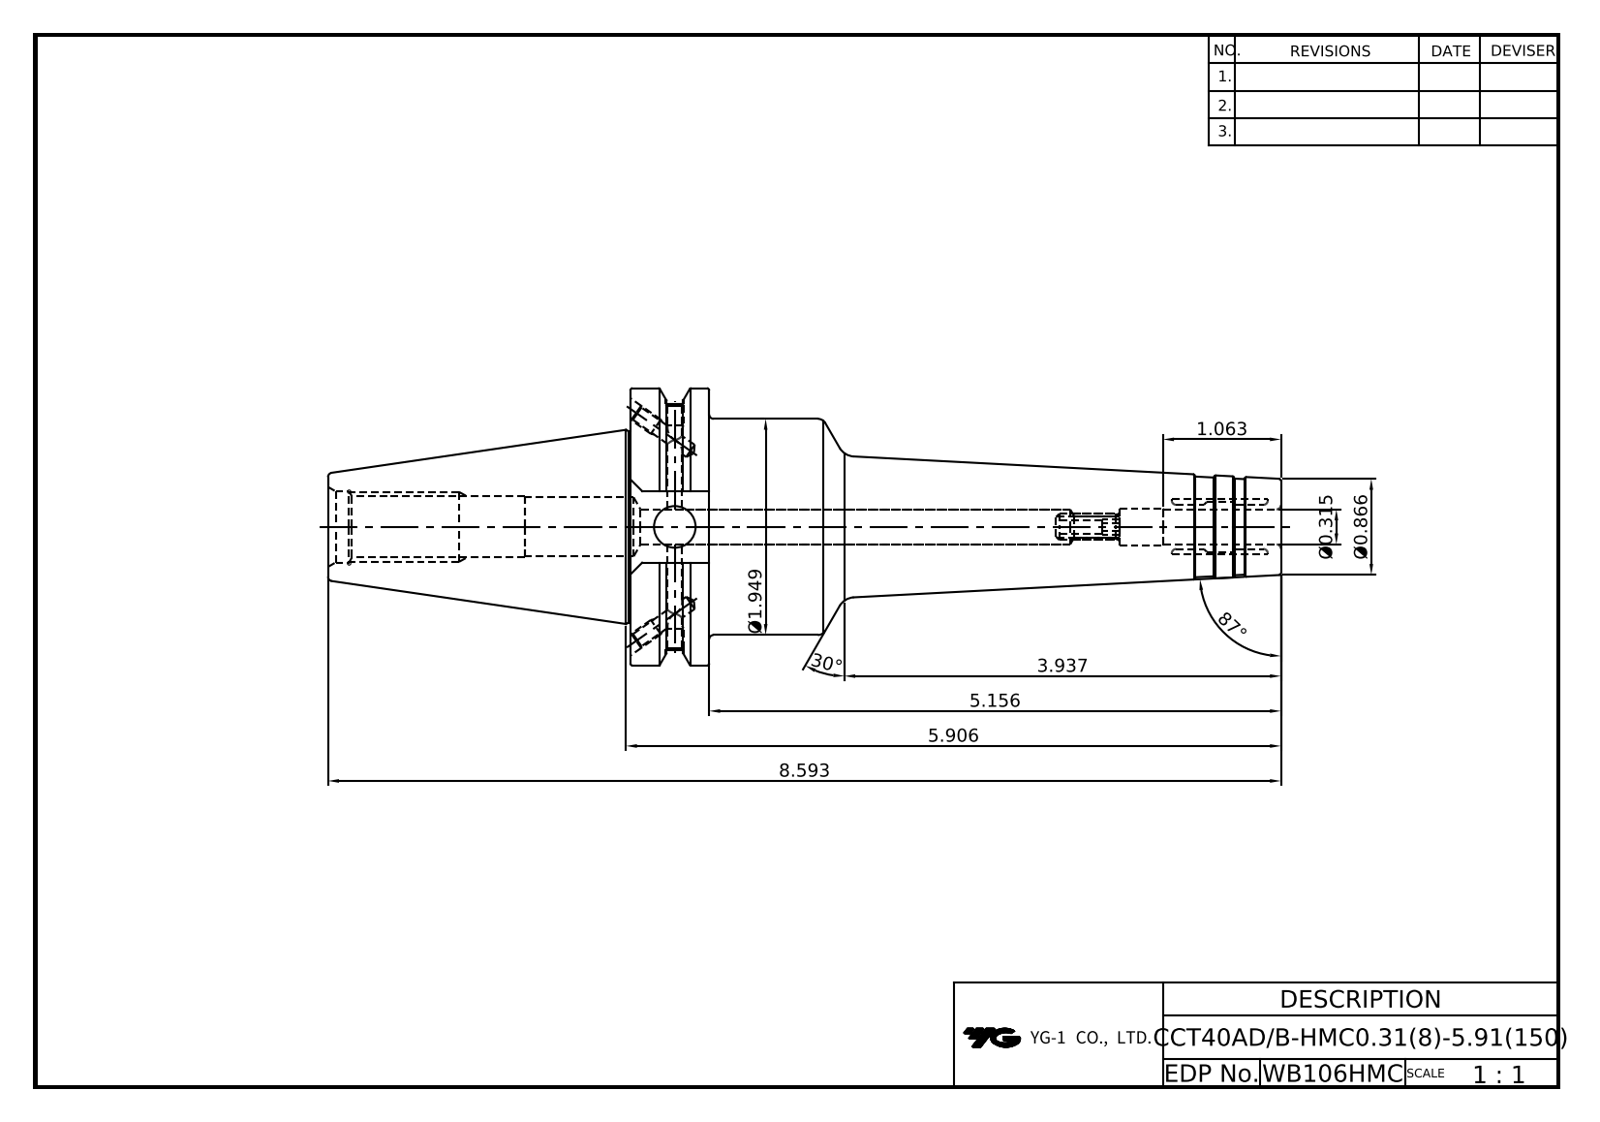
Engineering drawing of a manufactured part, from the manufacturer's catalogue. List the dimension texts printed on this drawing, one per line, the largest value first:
87°
30°
8.593
5.906
5.156
3.937
Ø1.949
1.063
Ø0.866
Ø0.315
